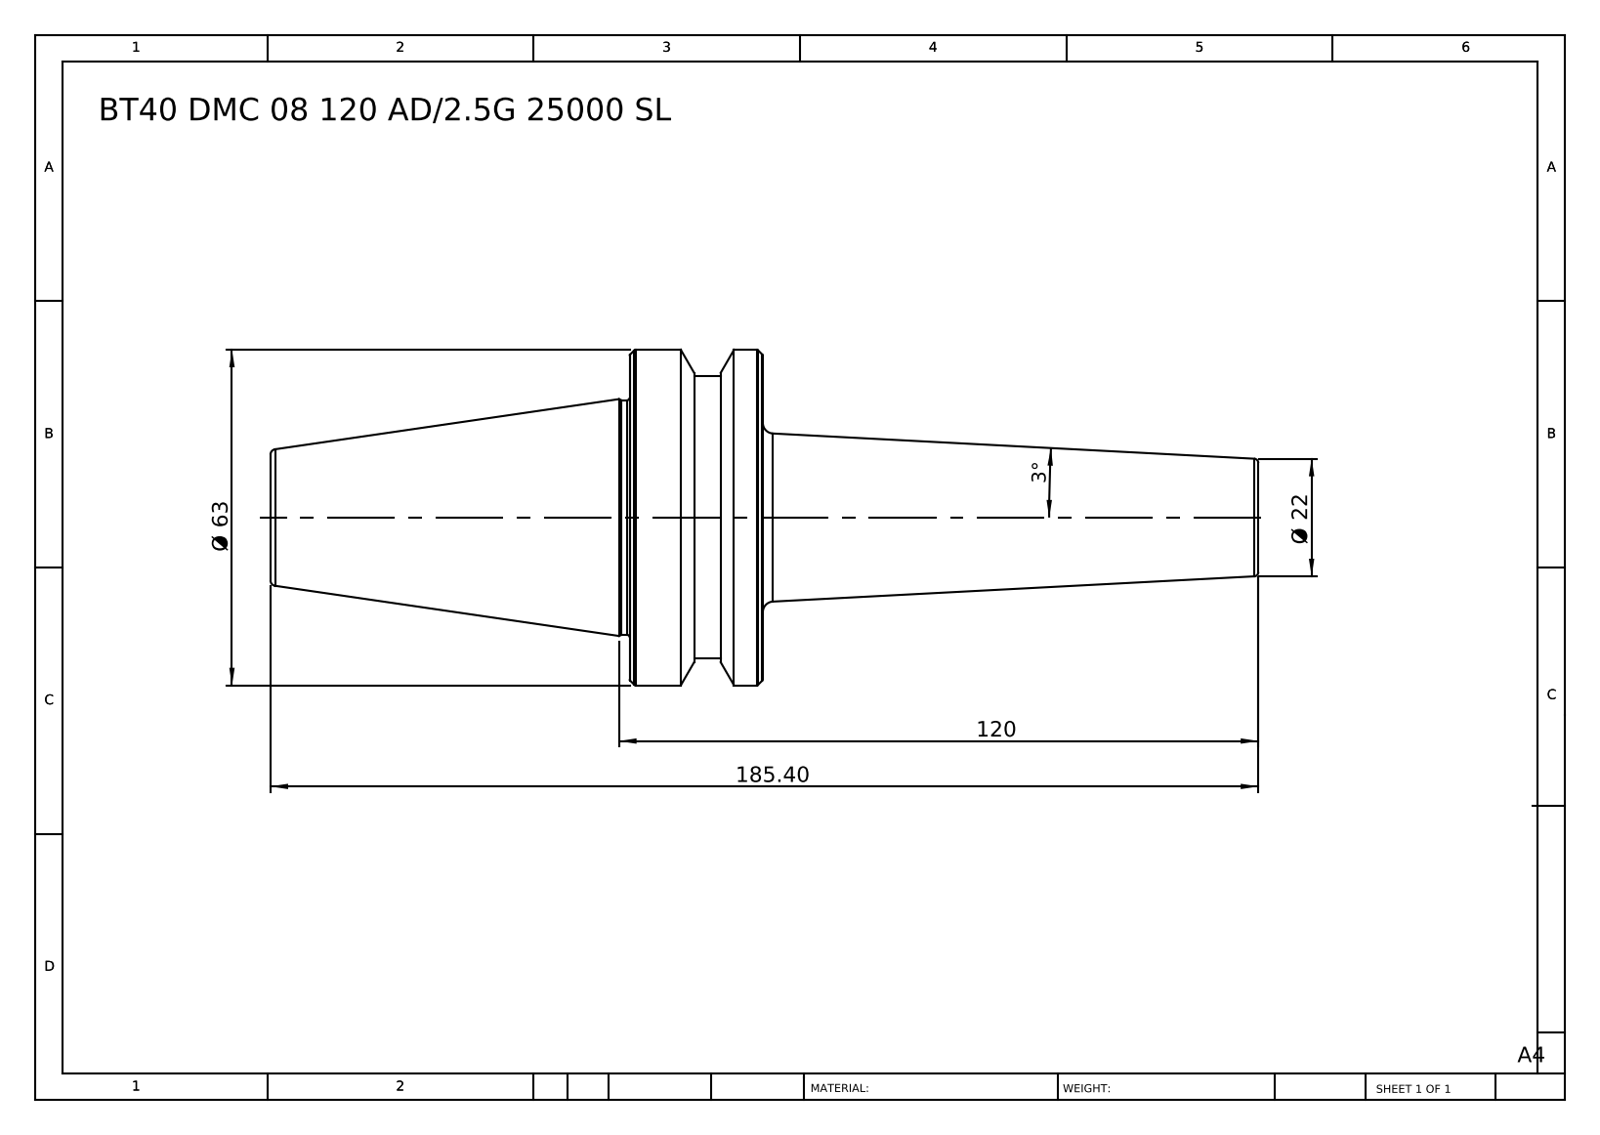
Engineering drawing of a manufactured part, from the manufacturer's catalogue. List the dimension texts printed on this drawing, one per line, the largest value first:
185.40
120
Ø 63
Ø 22
3°
